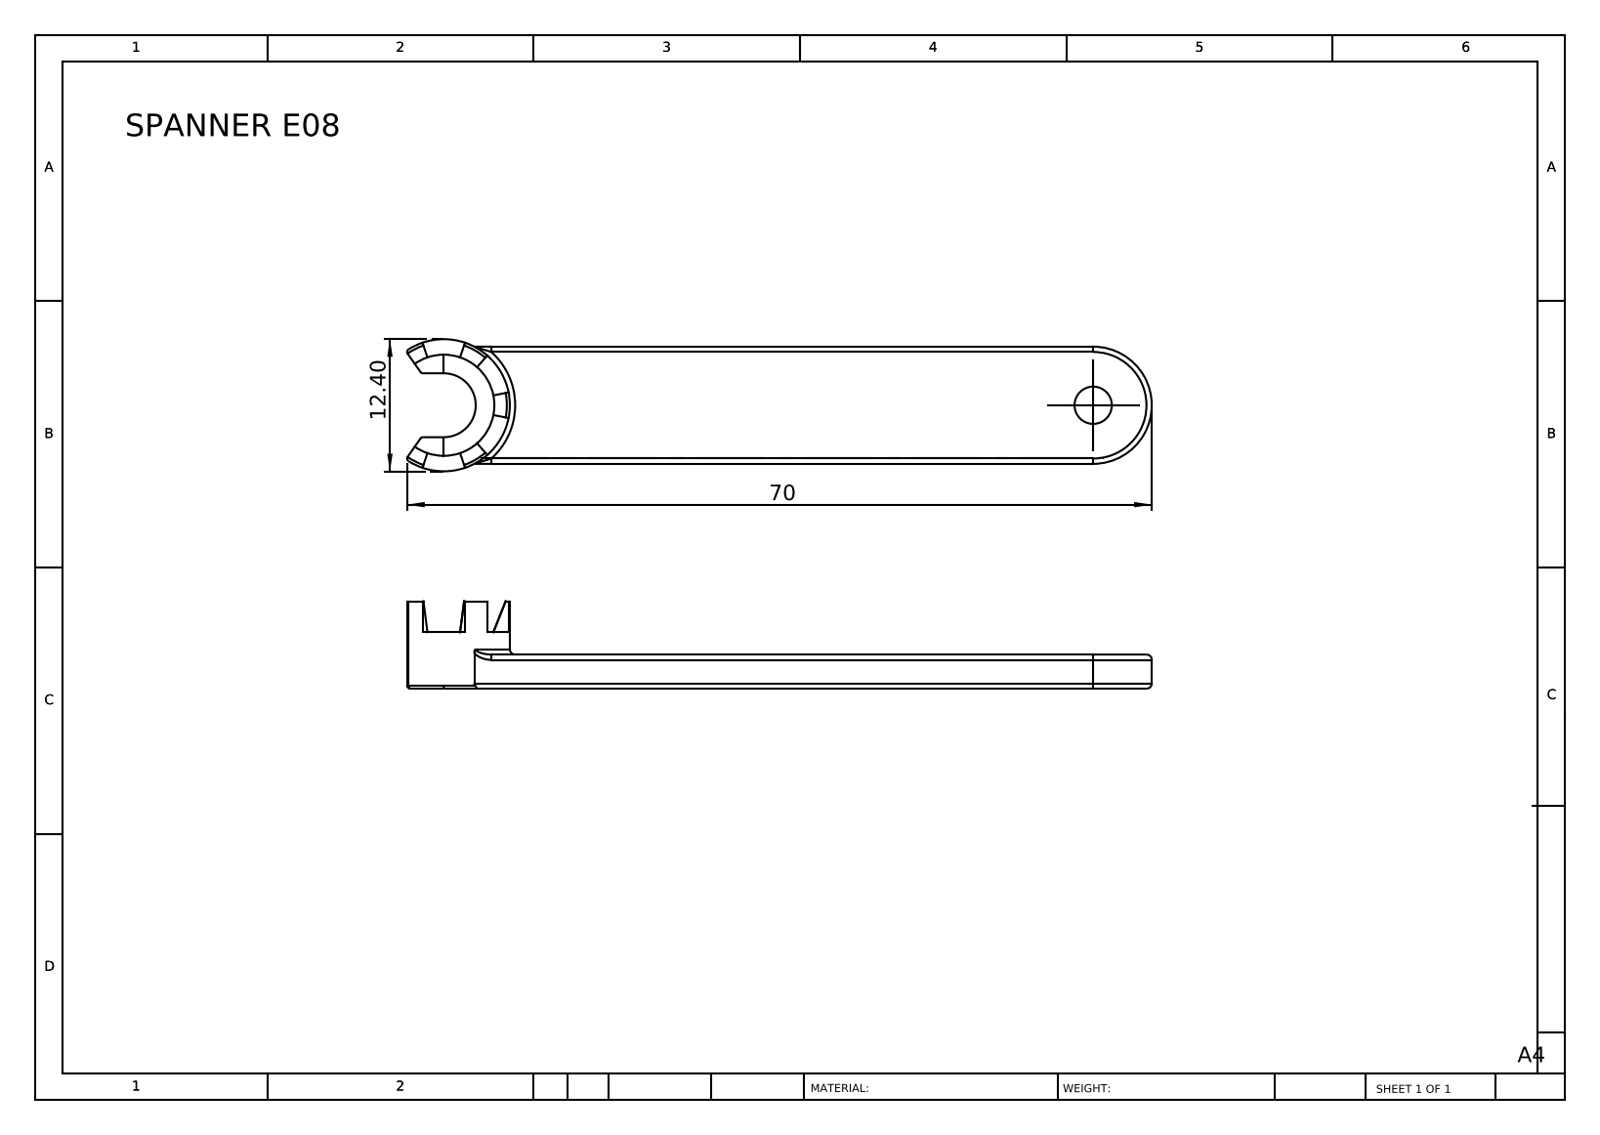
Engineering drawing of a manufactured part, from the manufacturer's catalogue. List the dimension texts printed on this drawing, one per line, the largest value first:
70
12.40
